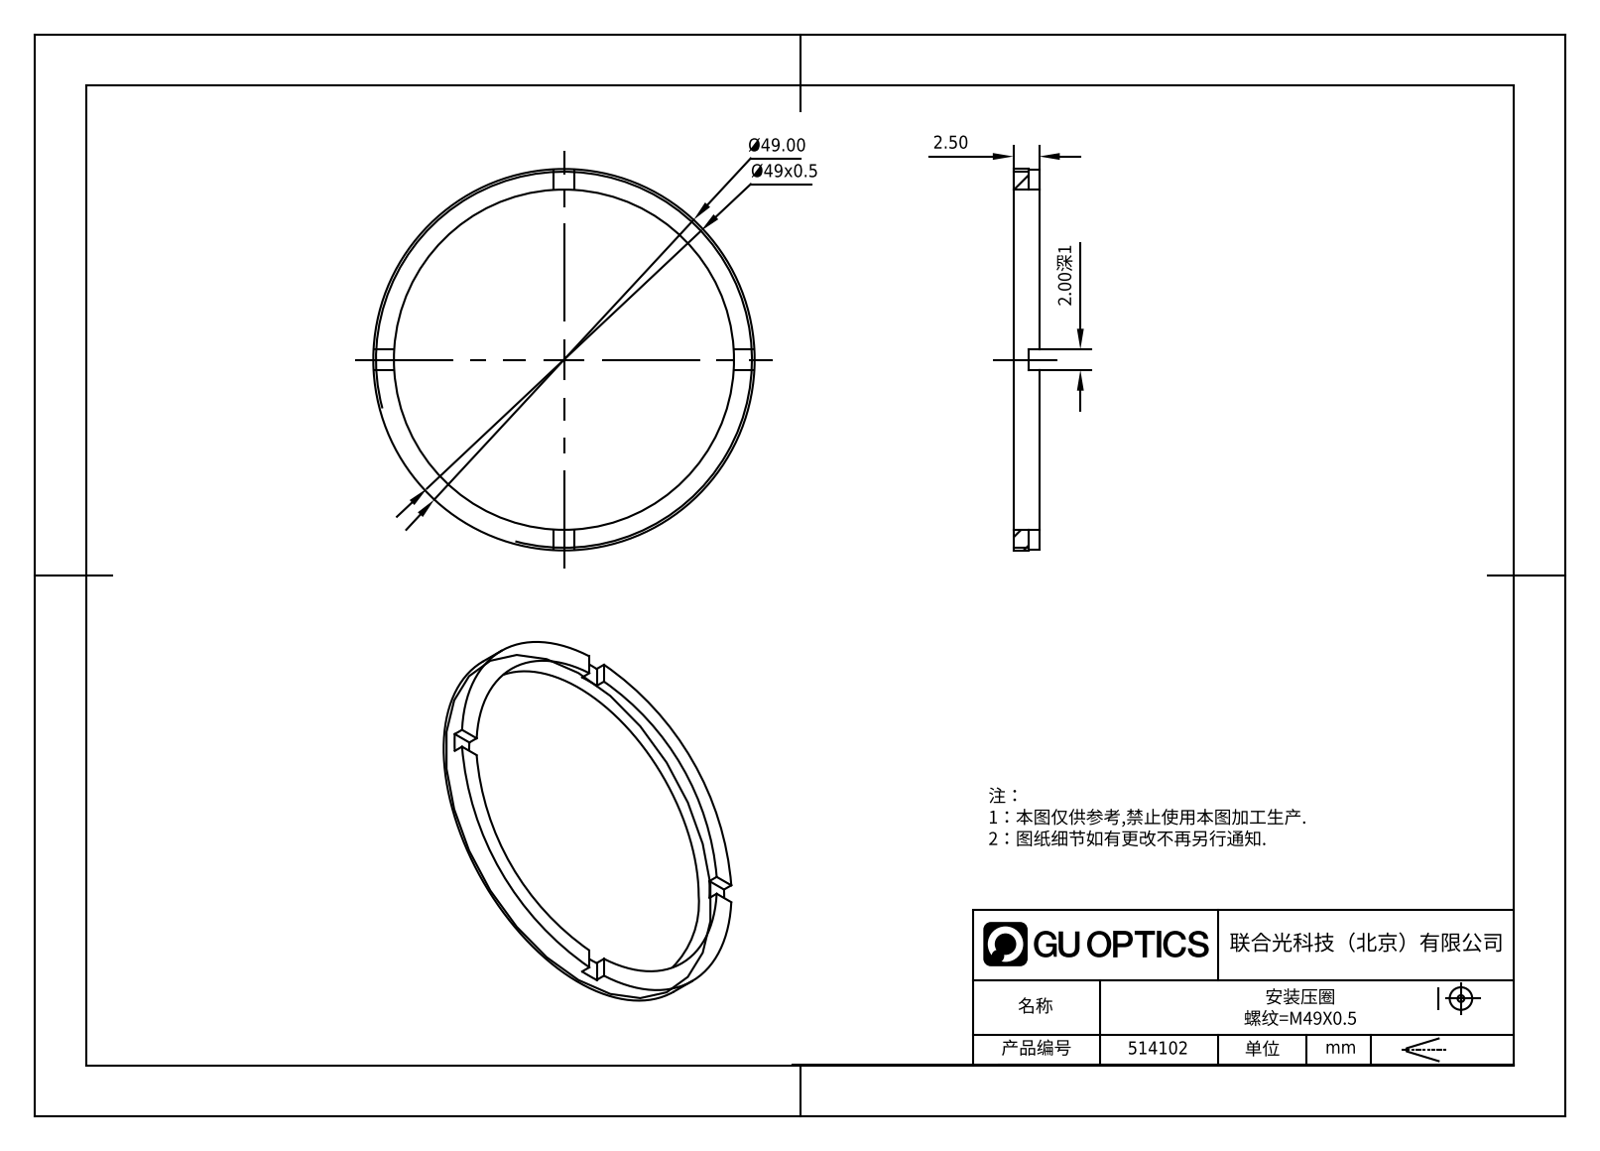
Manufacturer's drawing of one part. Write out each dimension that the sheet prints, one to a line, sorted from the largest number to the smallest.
Ø49.00
Ø49x0.5
2.50
2.00深1
